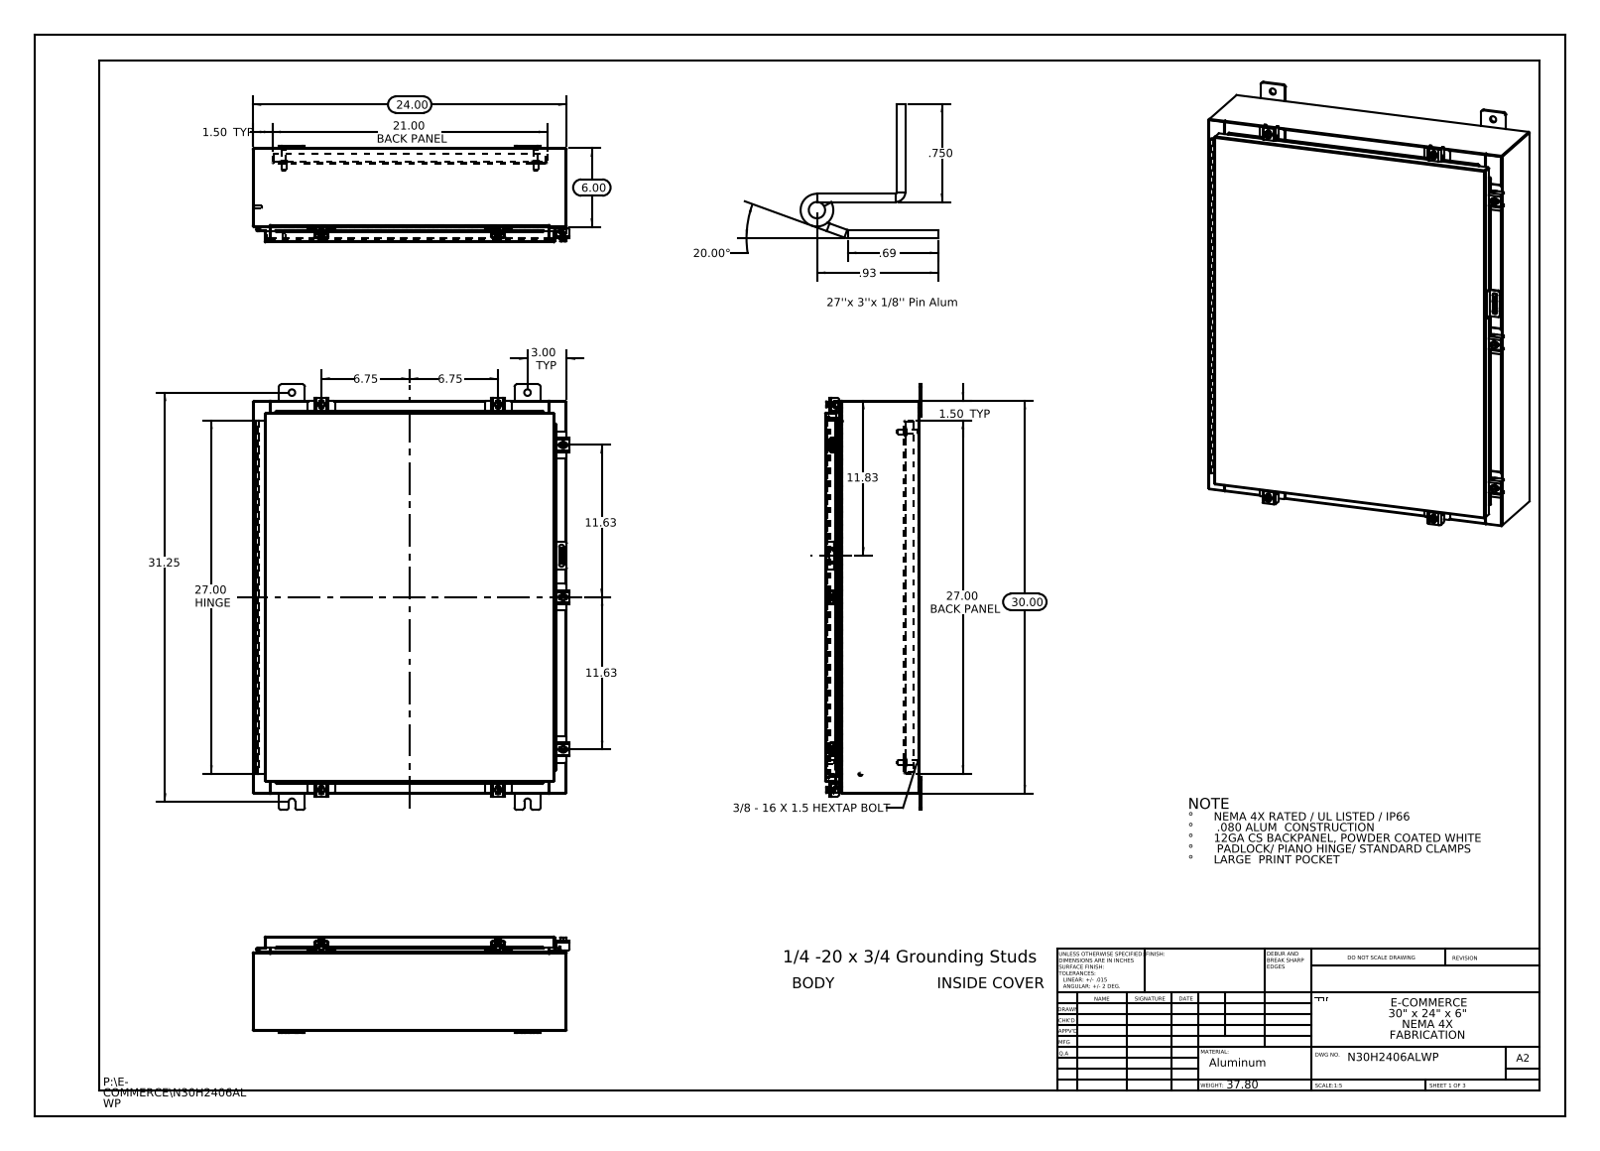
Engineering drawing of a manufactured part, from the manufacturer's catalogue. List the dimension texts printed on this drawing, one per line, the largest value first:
31.25
30.00
27.00 HINGE
27.00 BACK PANEL
24.00
21.00 BACK PANEL
20.00°
11.83
11.63
11.63
6.75
6.75
6.00
3.00 TYP
1.50 TYP
1.50 TYP
.93
.750
.69
